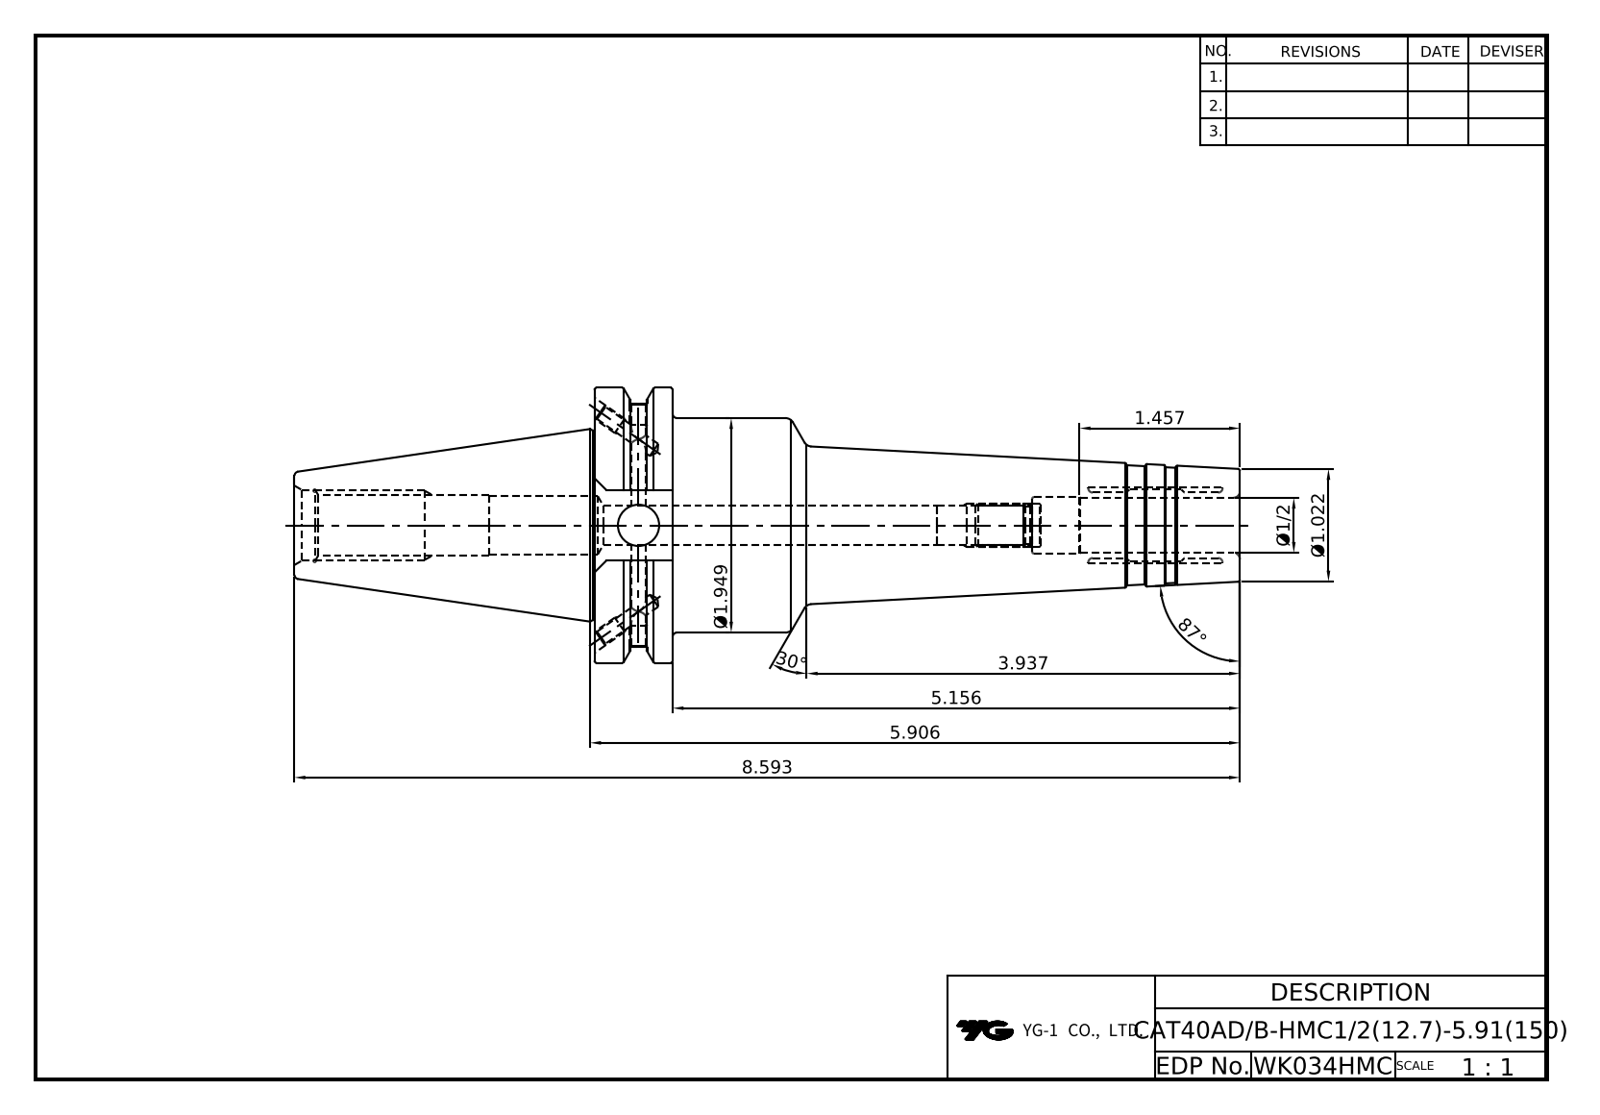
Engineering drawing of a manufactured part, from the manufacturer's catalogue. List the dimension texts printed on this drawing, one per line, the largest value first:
87°
30°
8.593
5.906
5.156
3.937
Ø1.949
1.457
Ø1.022
Ø1/2
